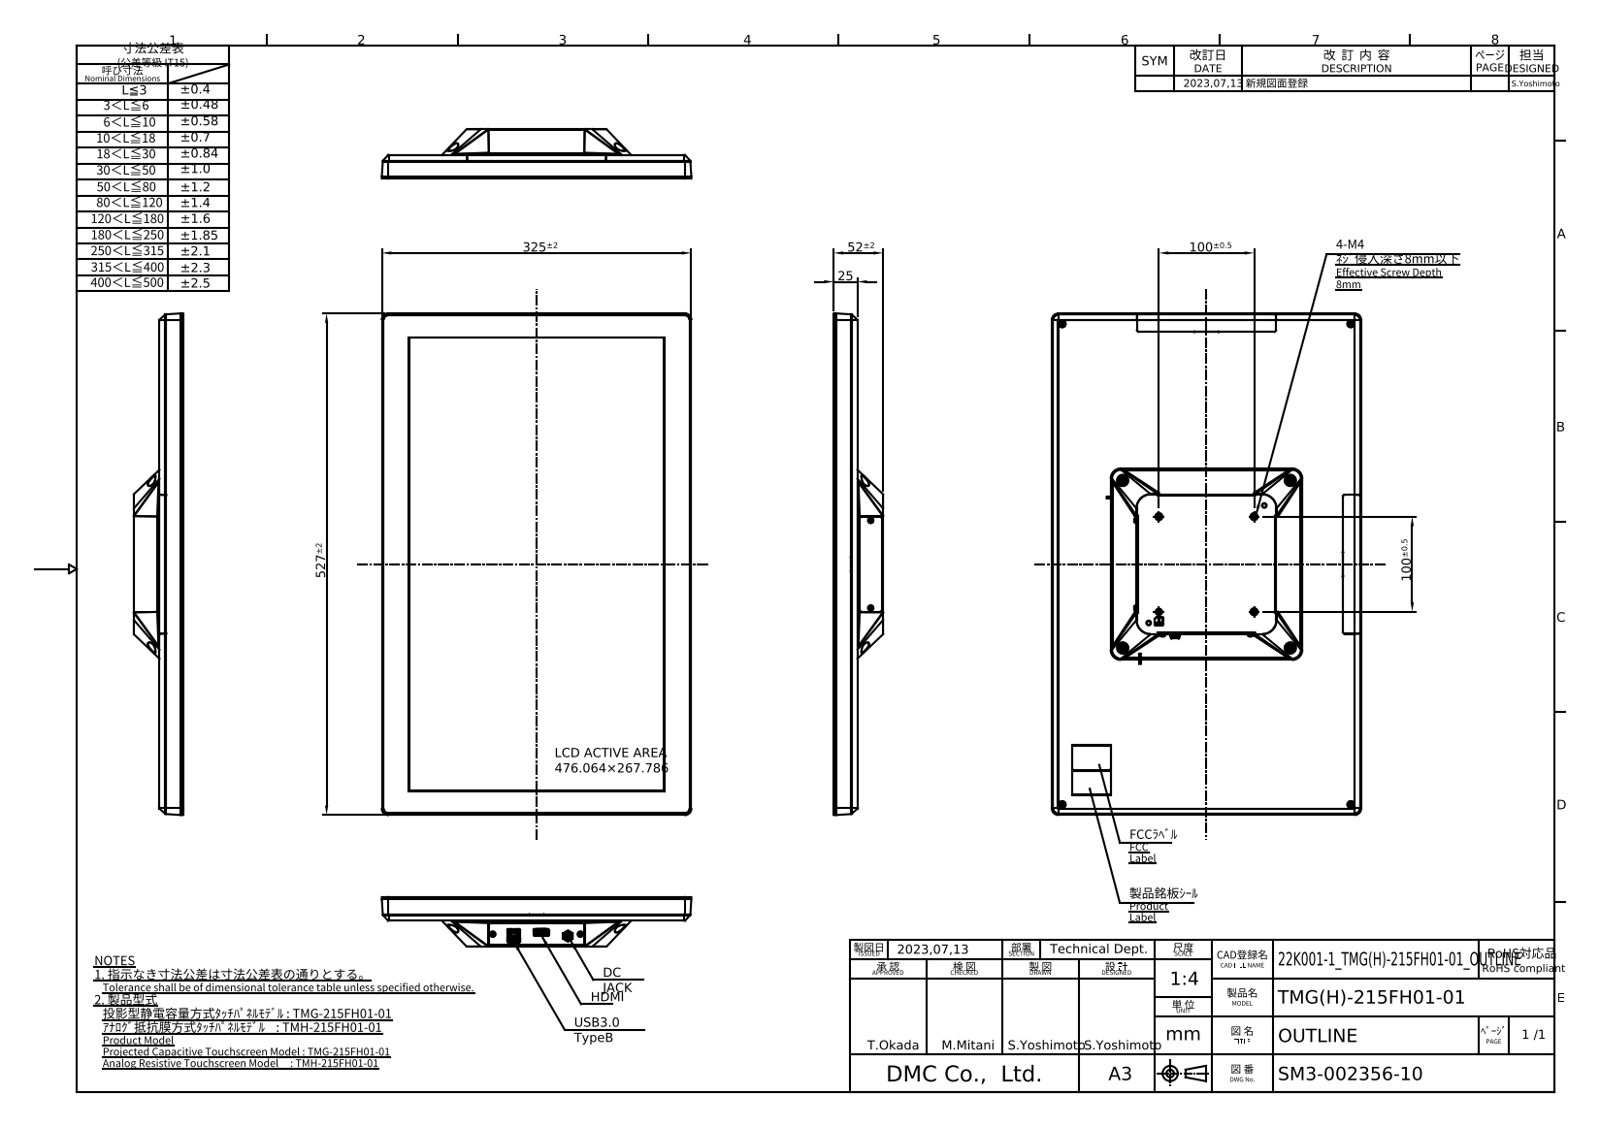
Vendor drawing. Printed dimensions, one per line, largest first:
527±2
325±2
100±0.5
100±0.5
52±2
25
